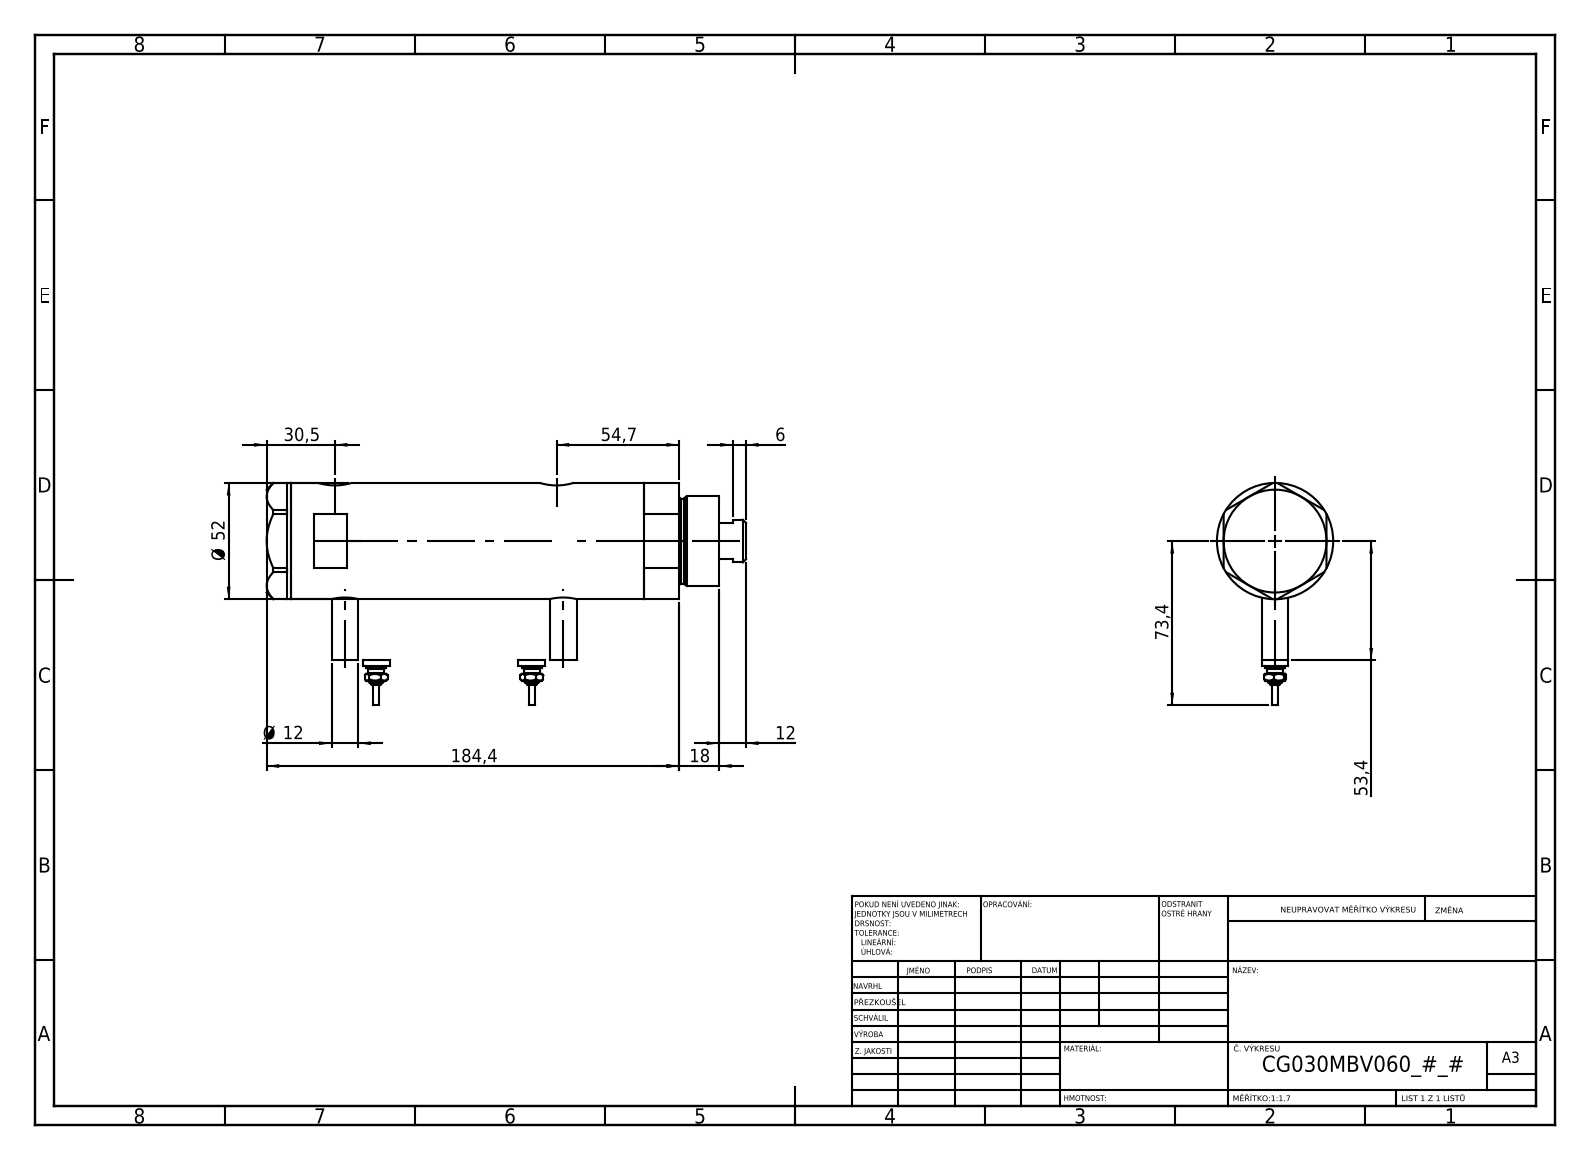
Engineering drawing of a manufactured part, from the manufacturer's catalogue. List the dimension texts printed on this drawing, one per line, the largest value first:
184,4
73,4
54,7
53,4
Ø 52
30,5
18
12
Ø 12
6
